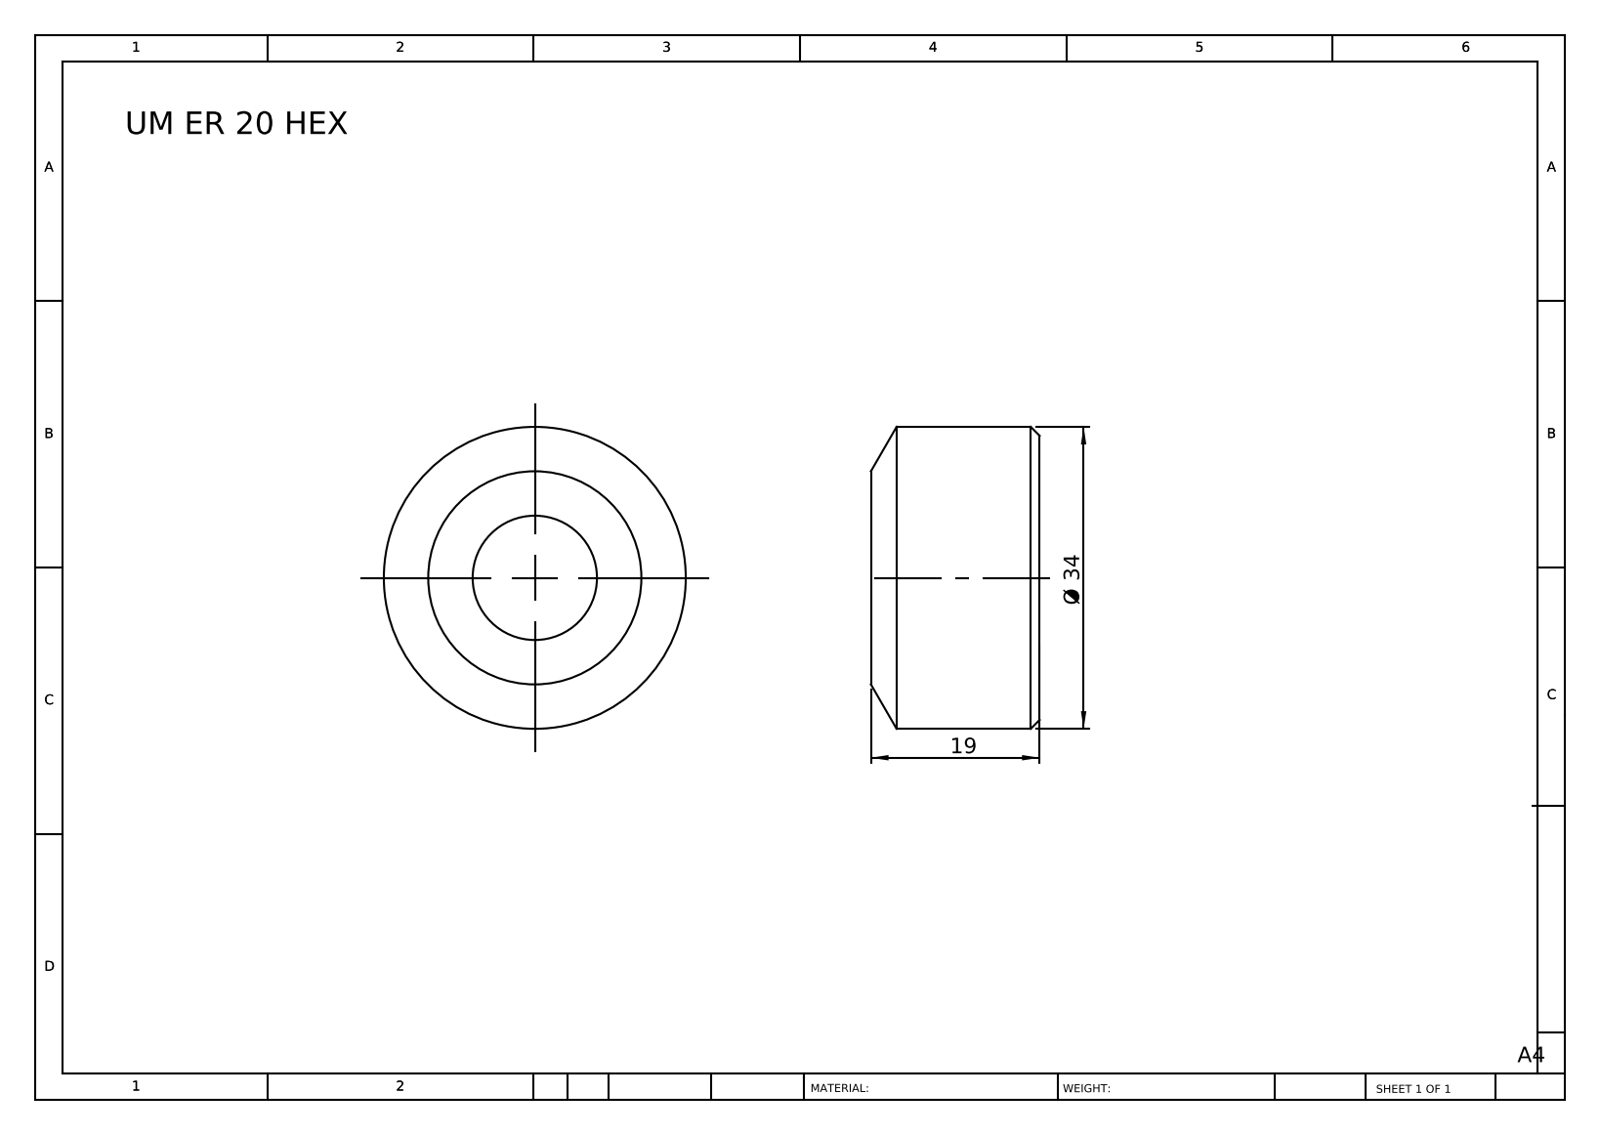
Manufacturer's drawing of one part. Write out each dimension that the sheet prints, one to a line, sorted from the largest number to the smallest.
Ø 34
19
